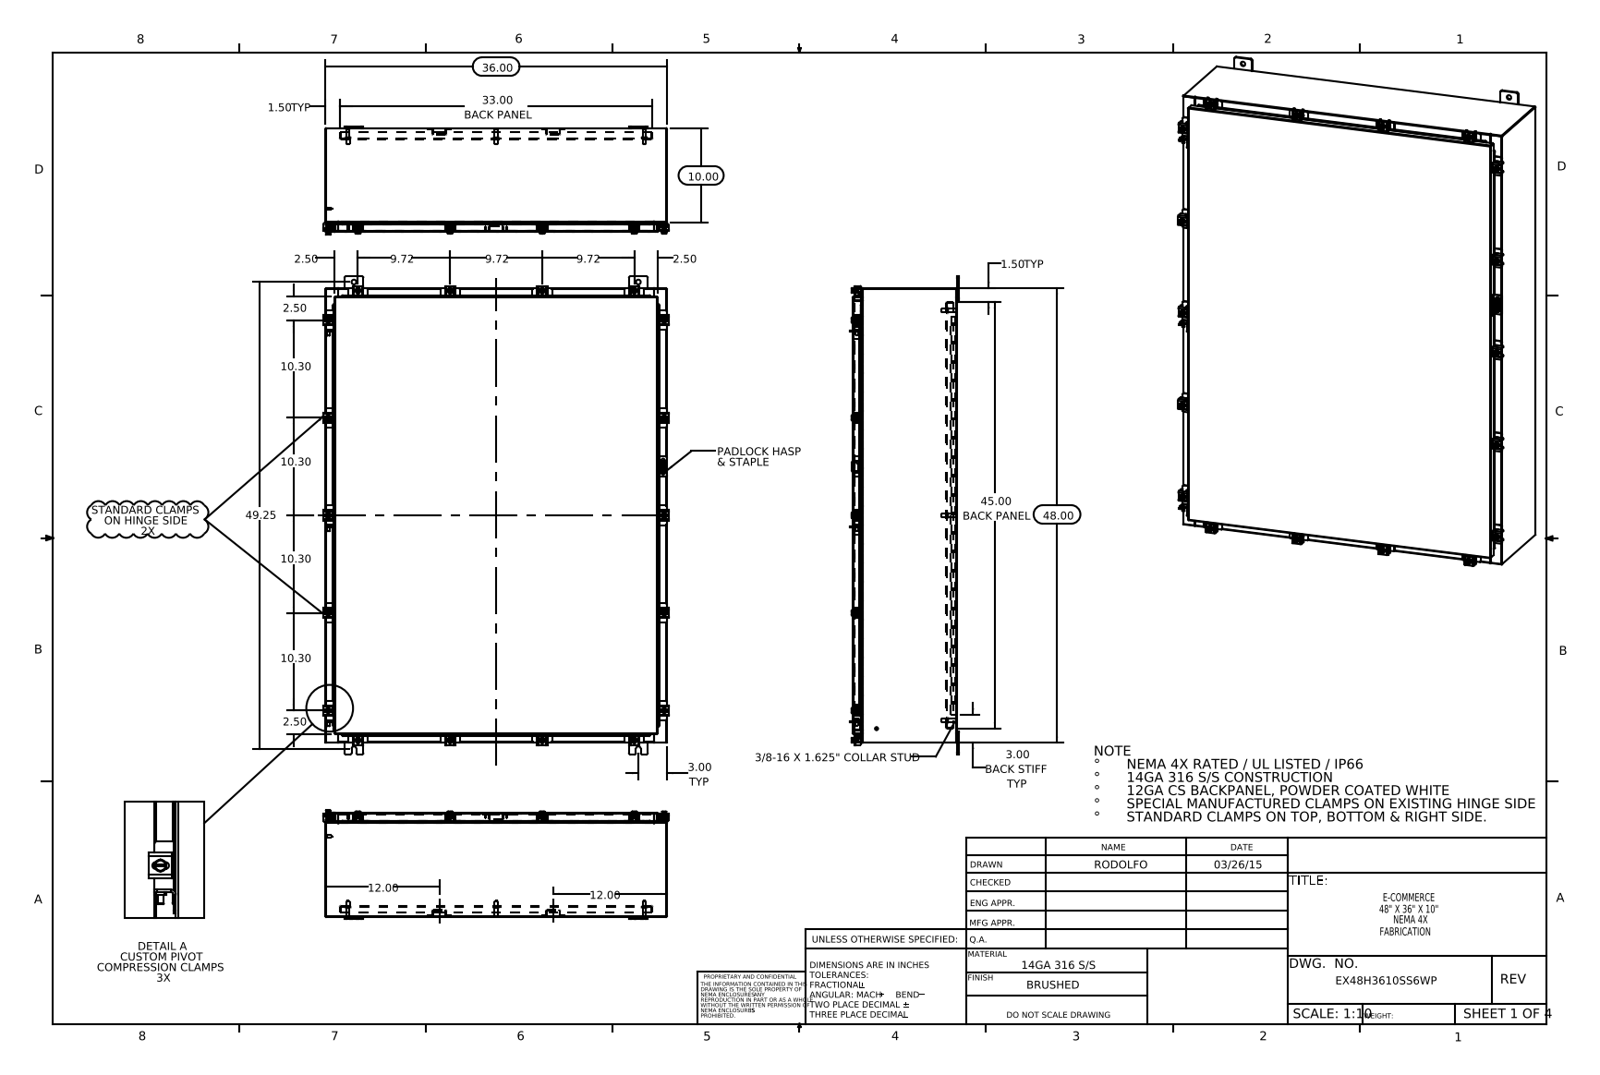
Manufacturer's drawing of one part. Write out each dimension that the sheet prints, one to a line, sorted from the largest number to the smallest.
49.25
48.00
45.00 BACK PANEL
36.00
33.00 BACK PANEL
12.00
12.00
10.30
10.30
10.30
10.30
10.00
9.72
9.72
9.72
3.00 TYP
3.00 BACK STIFF TYP
2.50
2.50
2.50
2.50
1.50 TYP
1.50 TYP
